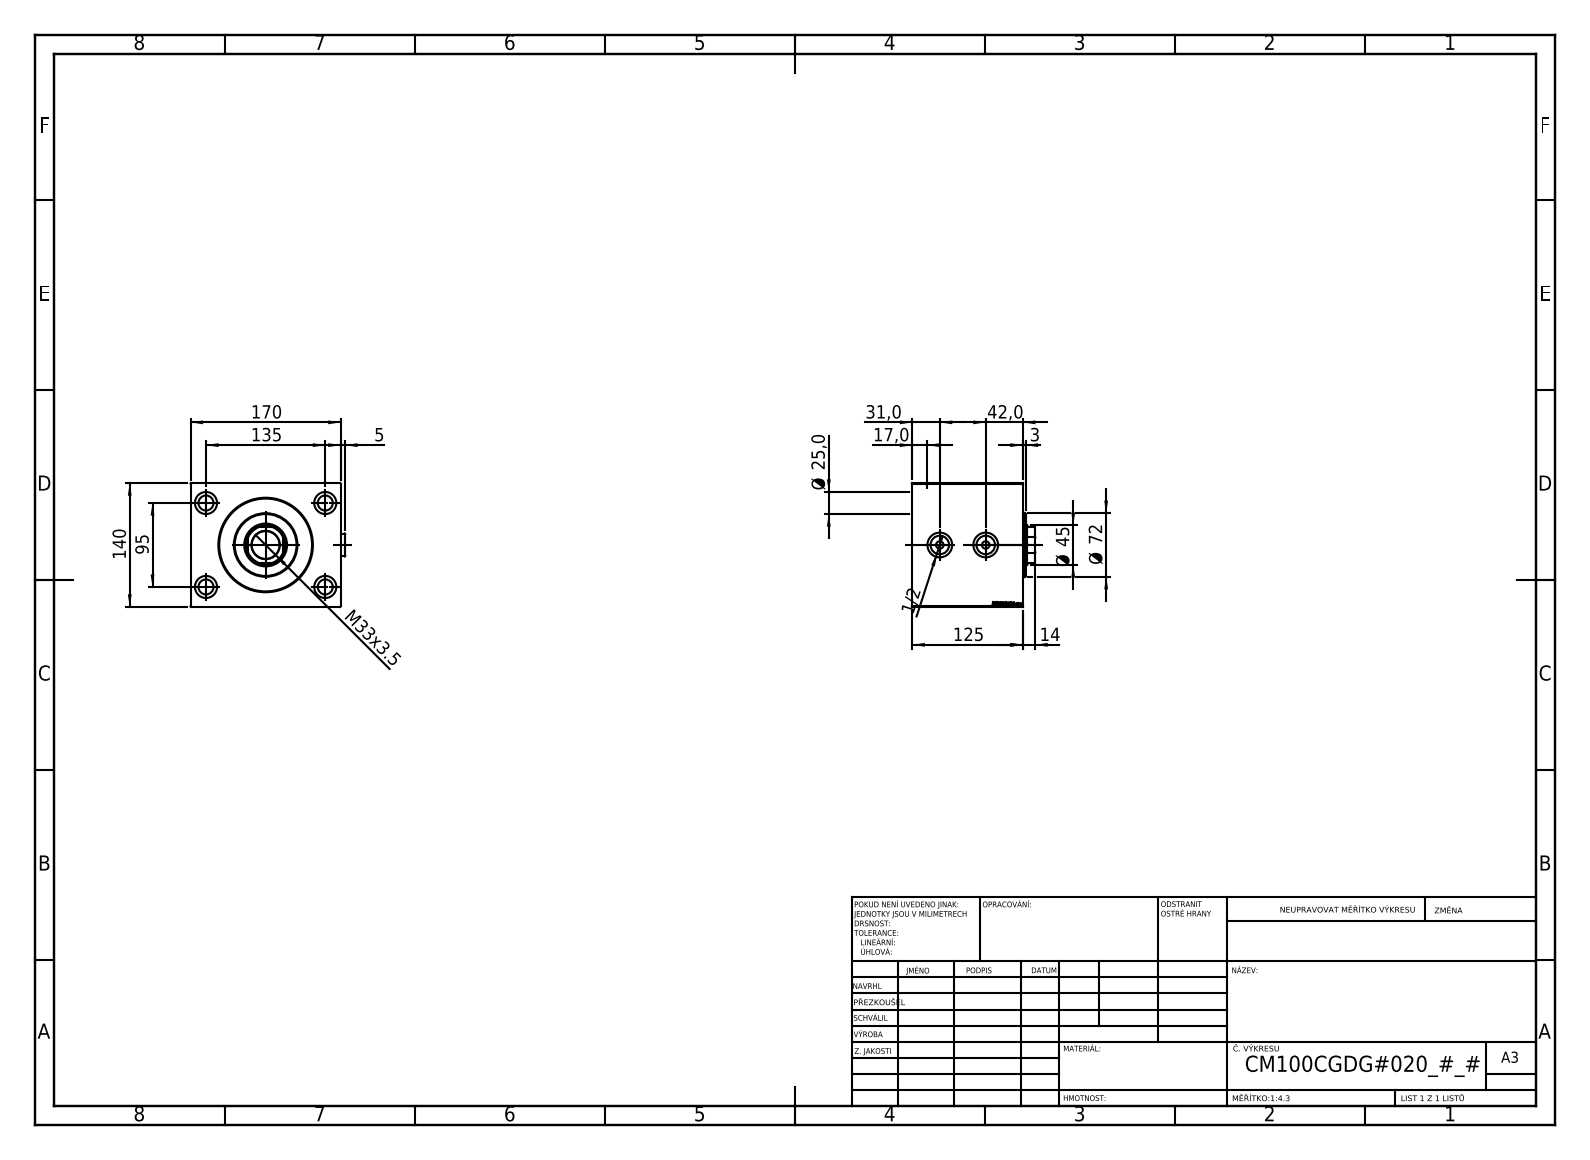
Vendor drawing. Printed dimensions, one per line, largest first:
170
140
135
125
95
Ø 72
Ø 45
42,0
M33x3.5
31,0
Ø 25,0
17,0
14
5
3
1/2
